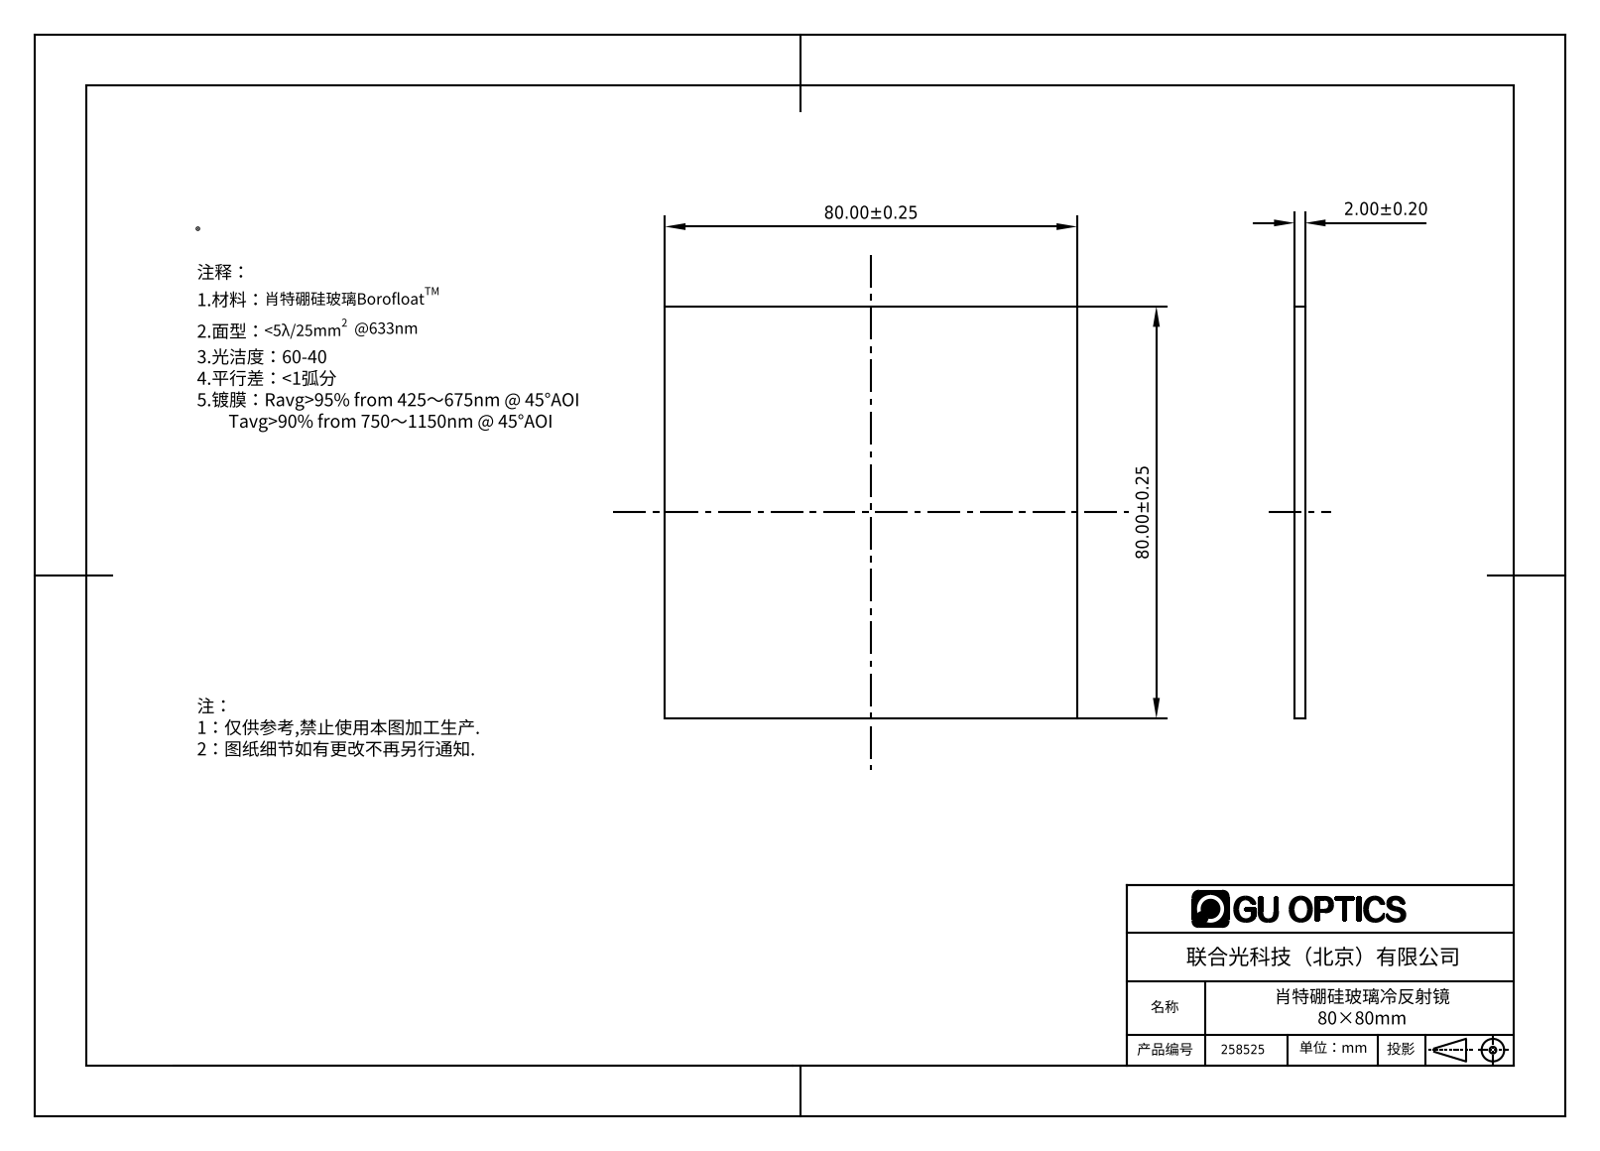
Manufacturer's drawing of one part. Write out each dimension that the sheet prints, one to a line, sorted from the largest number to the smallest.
80.00±0.25
80.00±0.25
2.00±0.20
